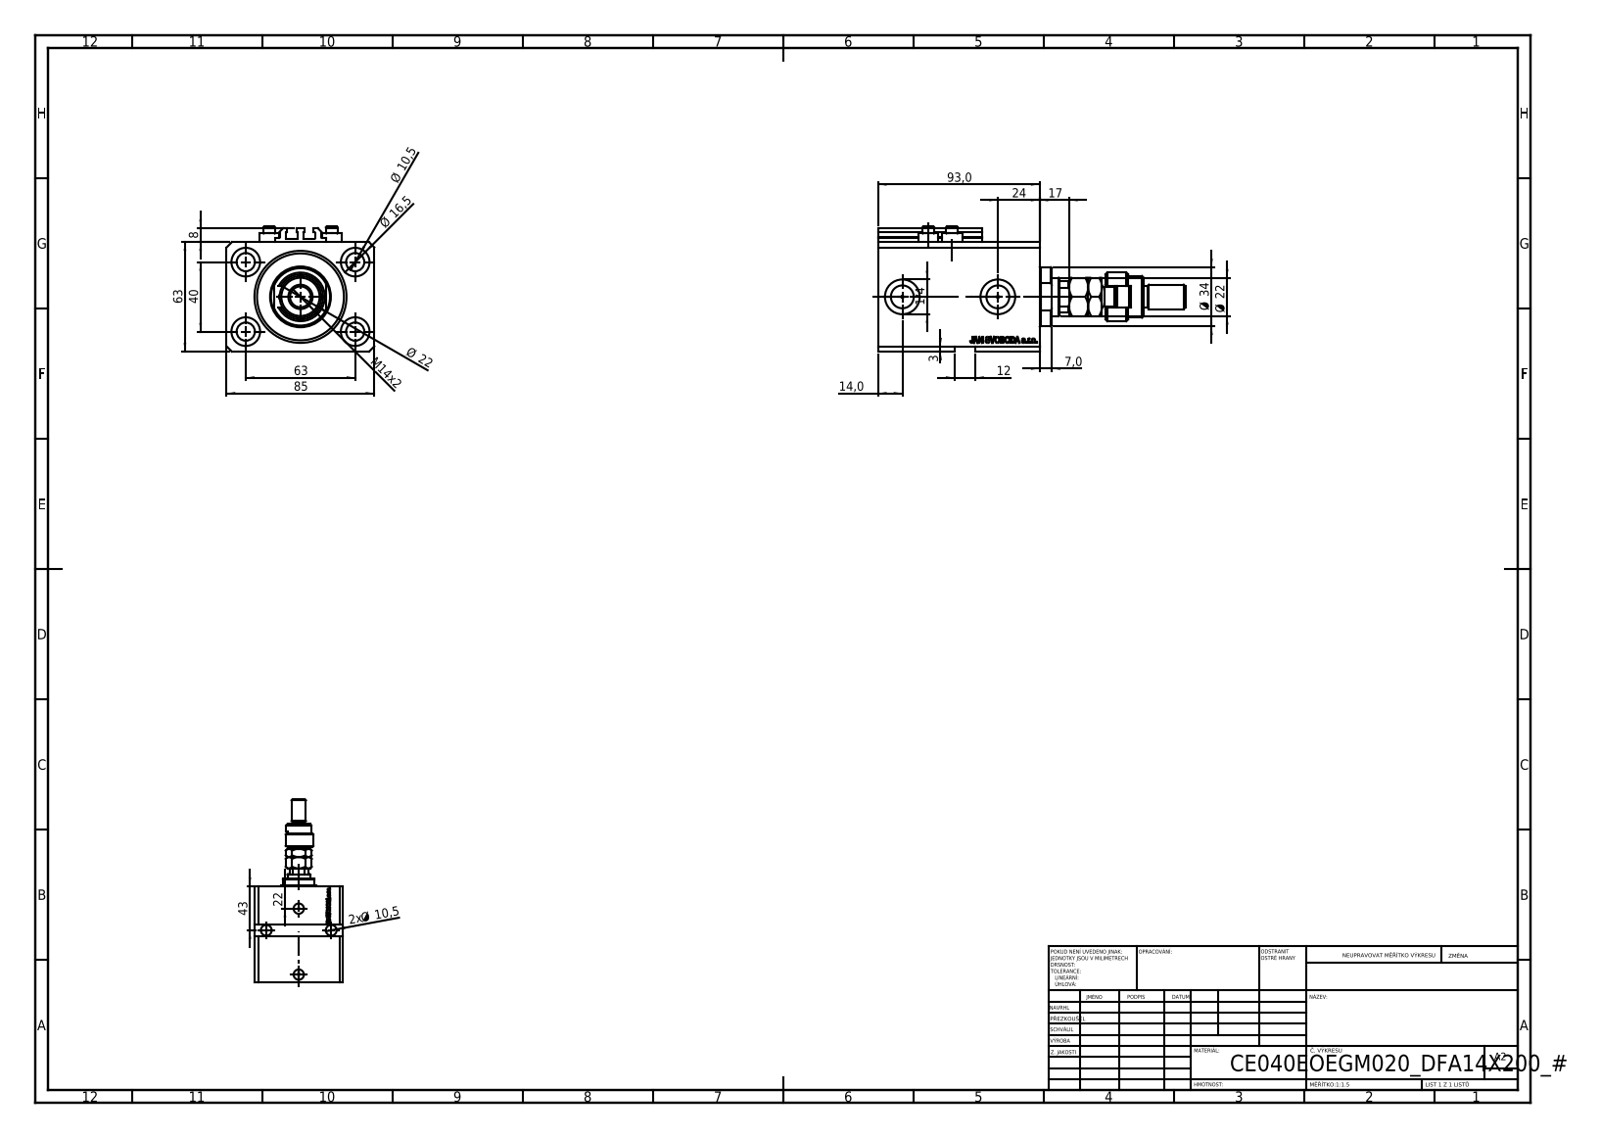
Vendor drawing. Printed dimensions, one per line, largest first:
93,0
85
63
63
43
40
Ø 34
24
Ø 22
Ø 22
22
17
Ø 16,5
M14x2
14,0
12
Ø 10,5
2x Ø 10,5
8
7,0
3
1/4
